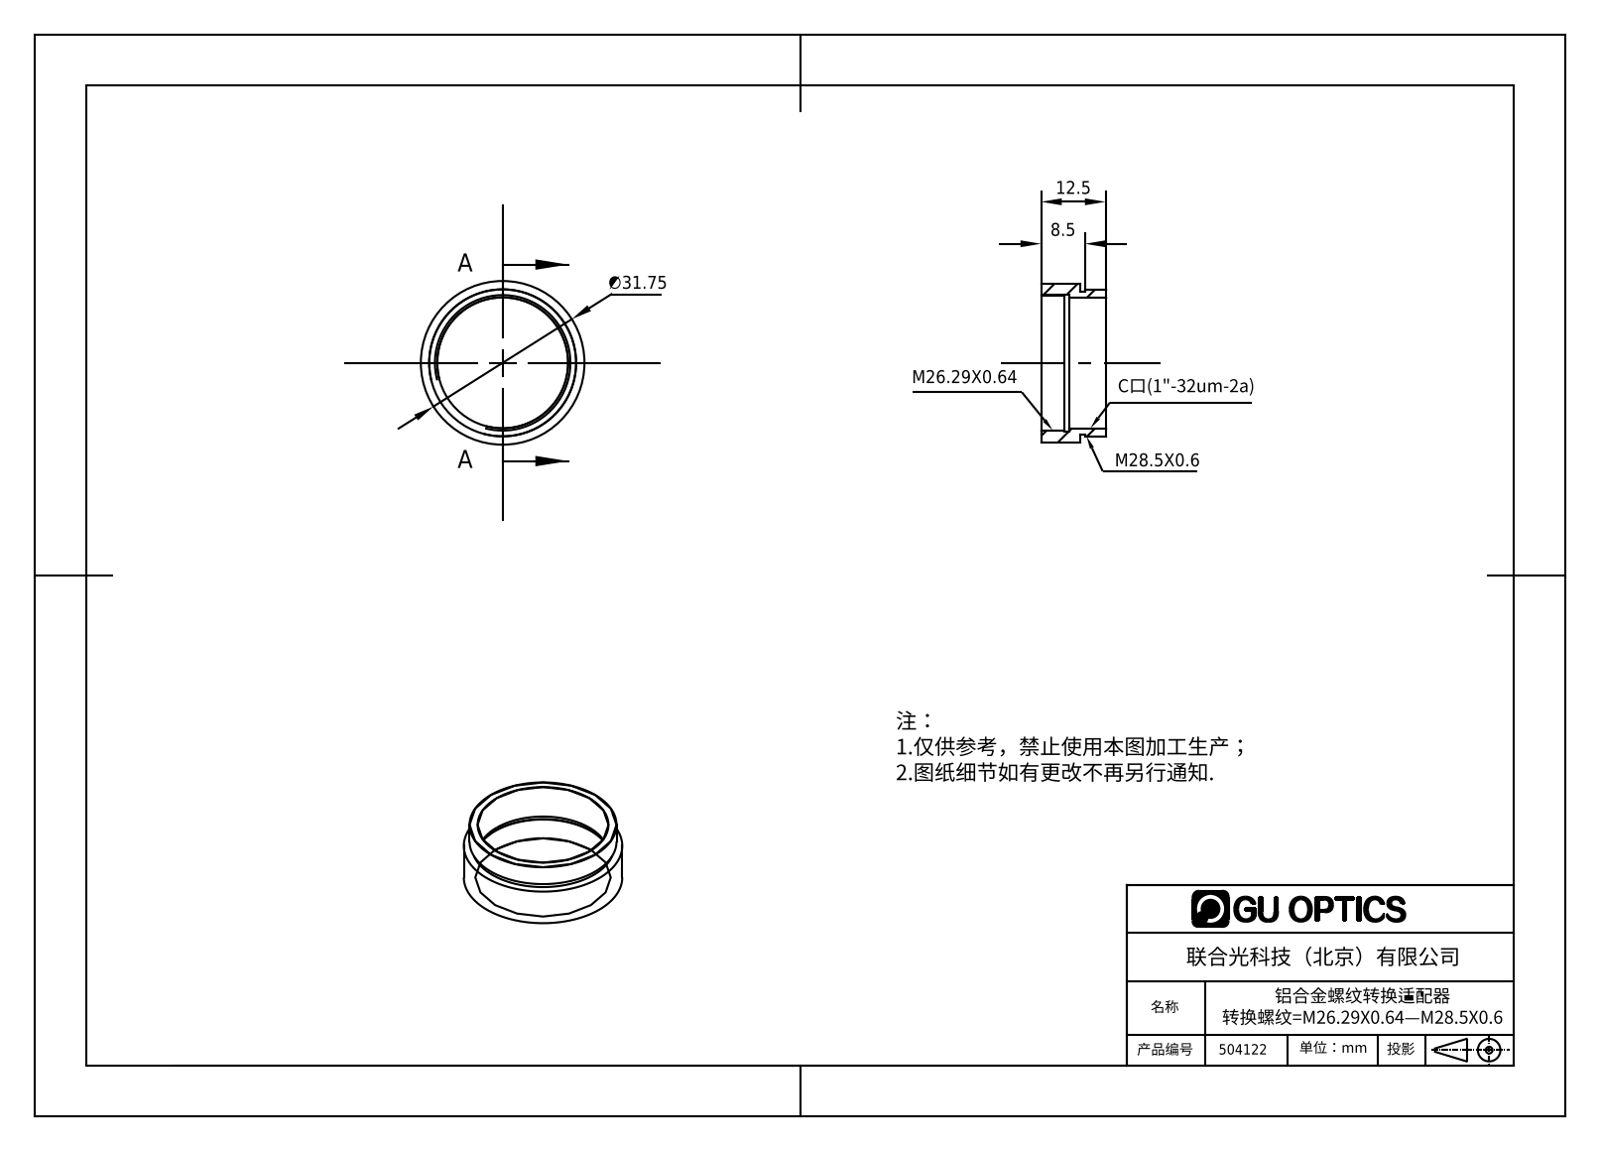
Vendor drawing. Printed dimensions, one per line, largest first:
∅31.75
12.5
8.5
